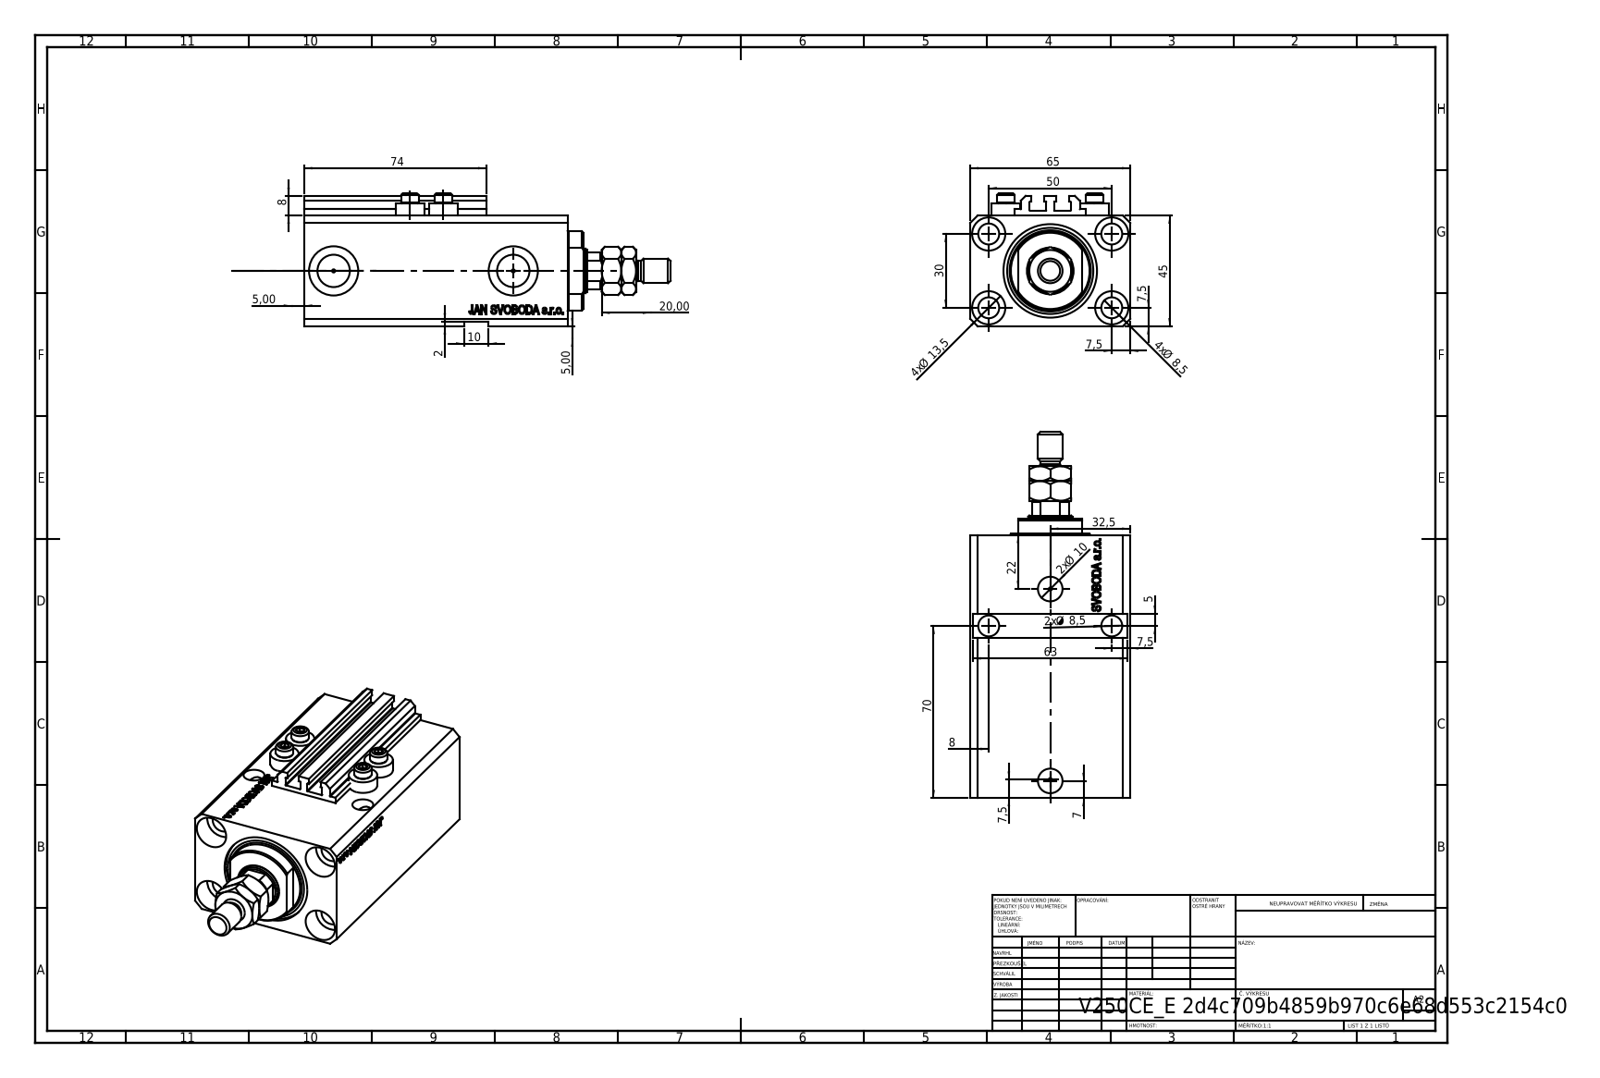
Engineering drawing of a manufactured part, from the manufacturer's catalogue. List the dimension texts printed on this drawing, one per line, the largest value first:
74
70
65
63
50
45
32,5
30
22
20,00
4x Ø 13,5
10
2x Ø 10
4x Ø 8,5
2x Ø 8,5
8
8
7,5
7,5
7,5
7,5
7
5,00
5,00
5
2
